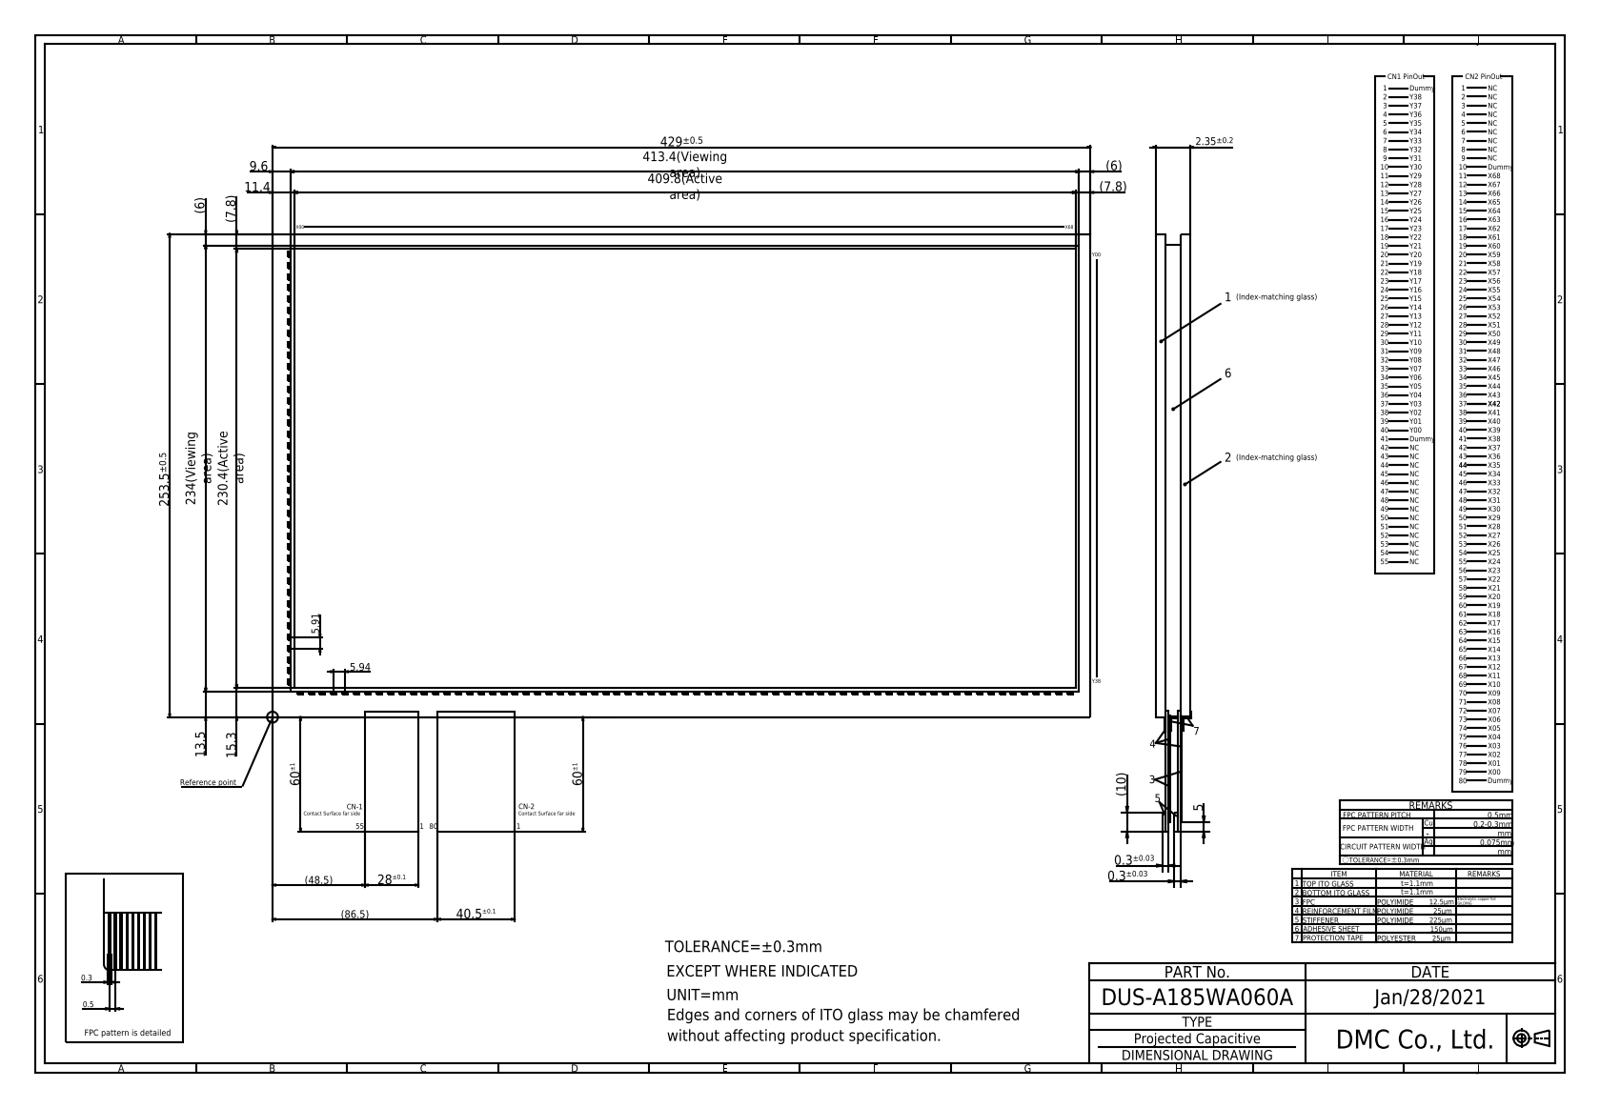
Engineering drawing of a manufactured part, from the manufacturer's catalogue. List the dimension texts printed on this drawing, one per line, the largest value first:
429±0.5
413.4(Viewing area)
409.8(Active area)
253.5±0.5
234(Viewing area)
230.4(Active area)
(86.5)
60±1
60±1
(48.5)
40.5±0.1
28±0.1
15.3
13.5
11.4
(10)
9.6
(7.8)
(7.8)
(6)
(6)
5.94
5.91
5
2.35±0.2
0.5
0.3
0.3±0.03
0.3±0.03
